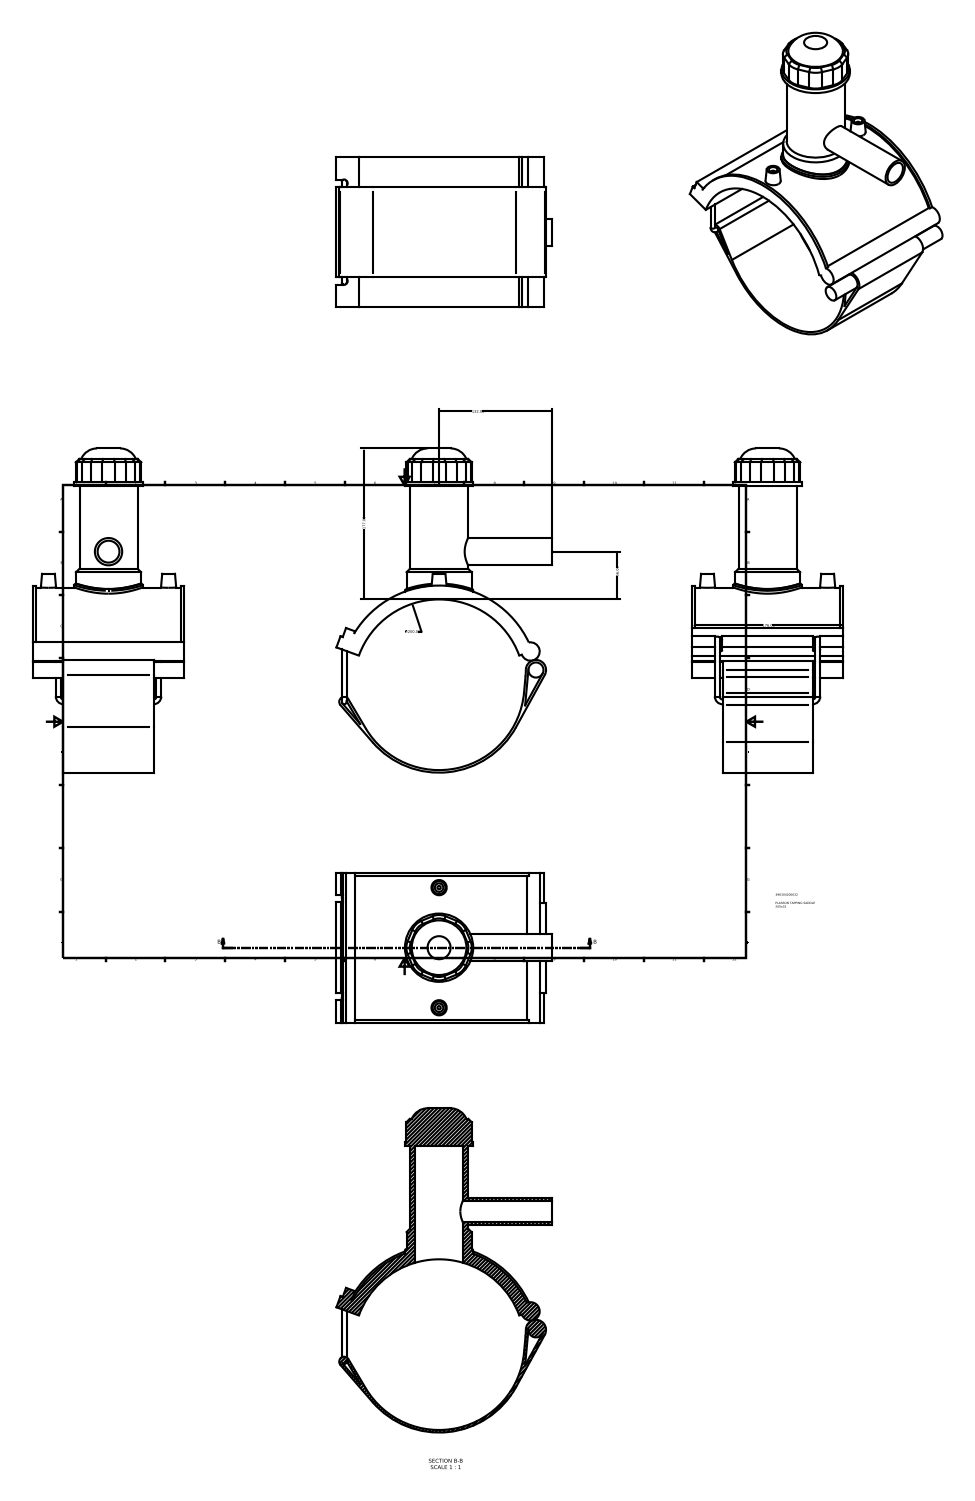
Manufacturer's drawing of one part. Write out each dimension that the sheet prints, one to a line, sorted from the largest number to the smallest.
∅200.00
177.00
176.00
132.00
56.00
